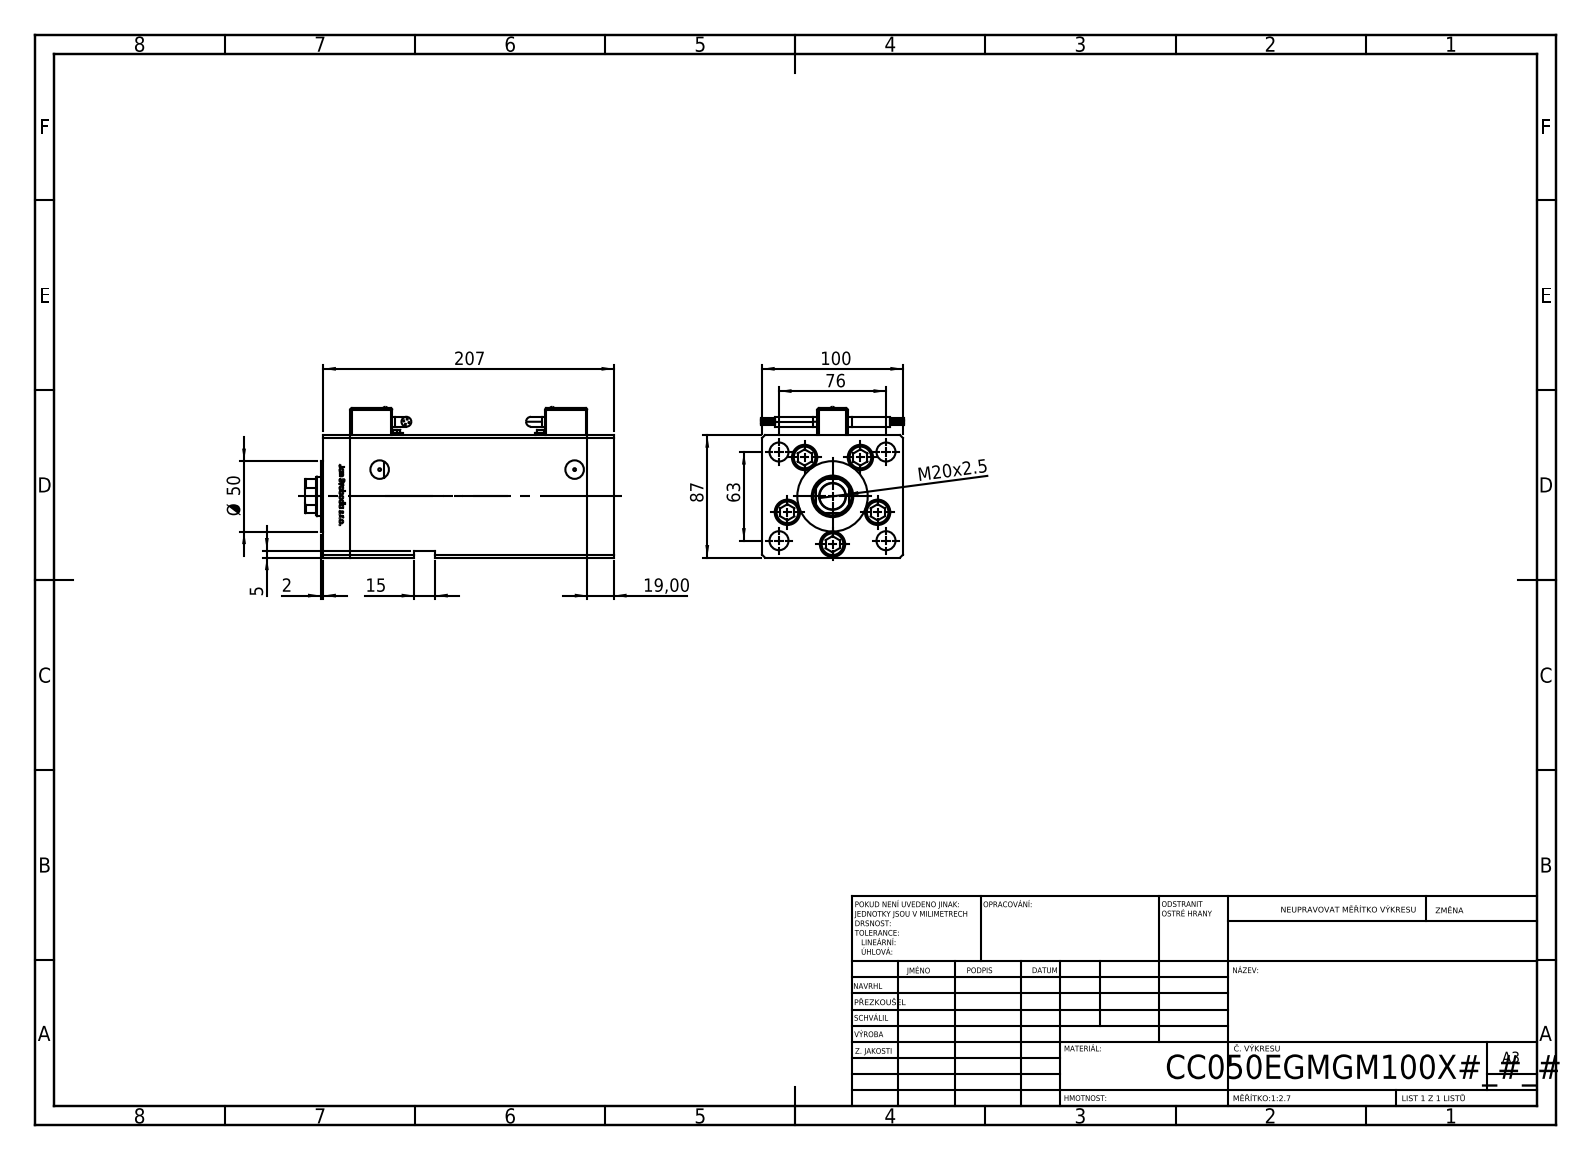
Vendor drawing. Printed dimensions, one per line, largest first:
207
100
87
76
63
Ø 50
M20x2.5
19,00
15
5
2
